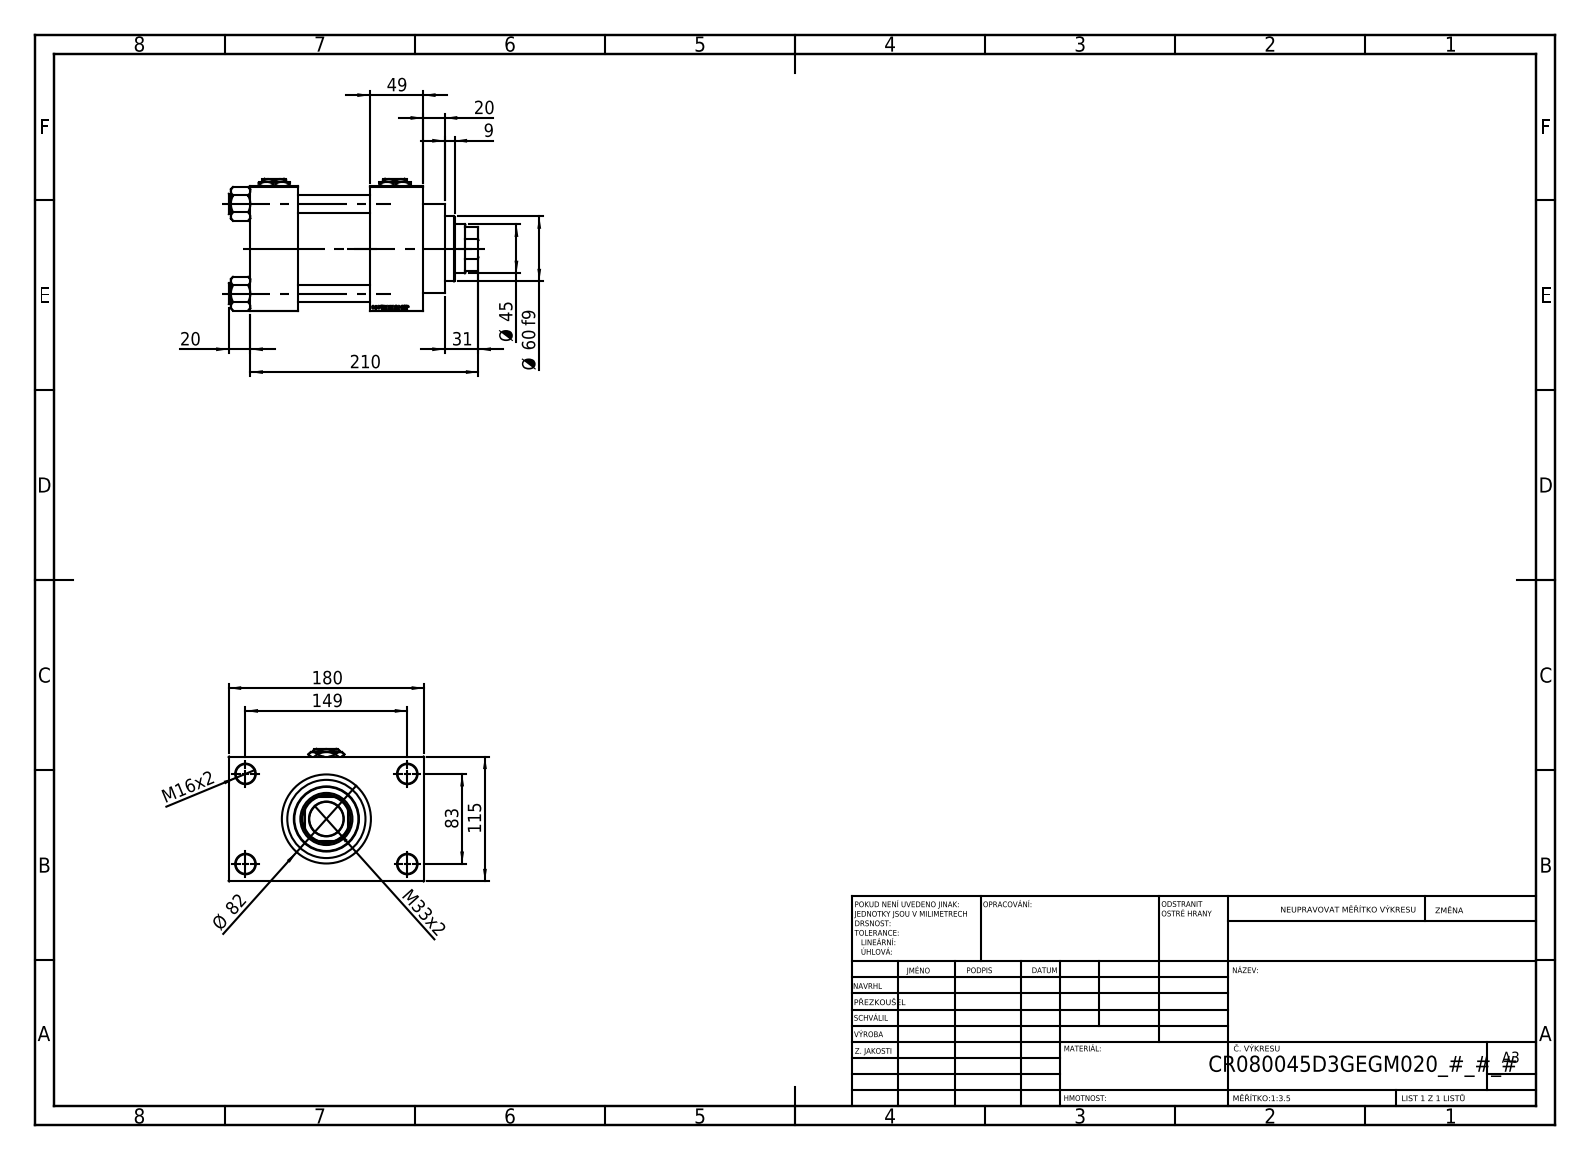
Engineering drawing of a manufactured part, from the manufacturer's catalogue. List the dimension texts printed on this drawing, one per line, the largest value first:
210
180
149
115
83
Ø 82
Ø 60 f9
49
Ø 45
M33x2
31
20
20
M16x2
9
